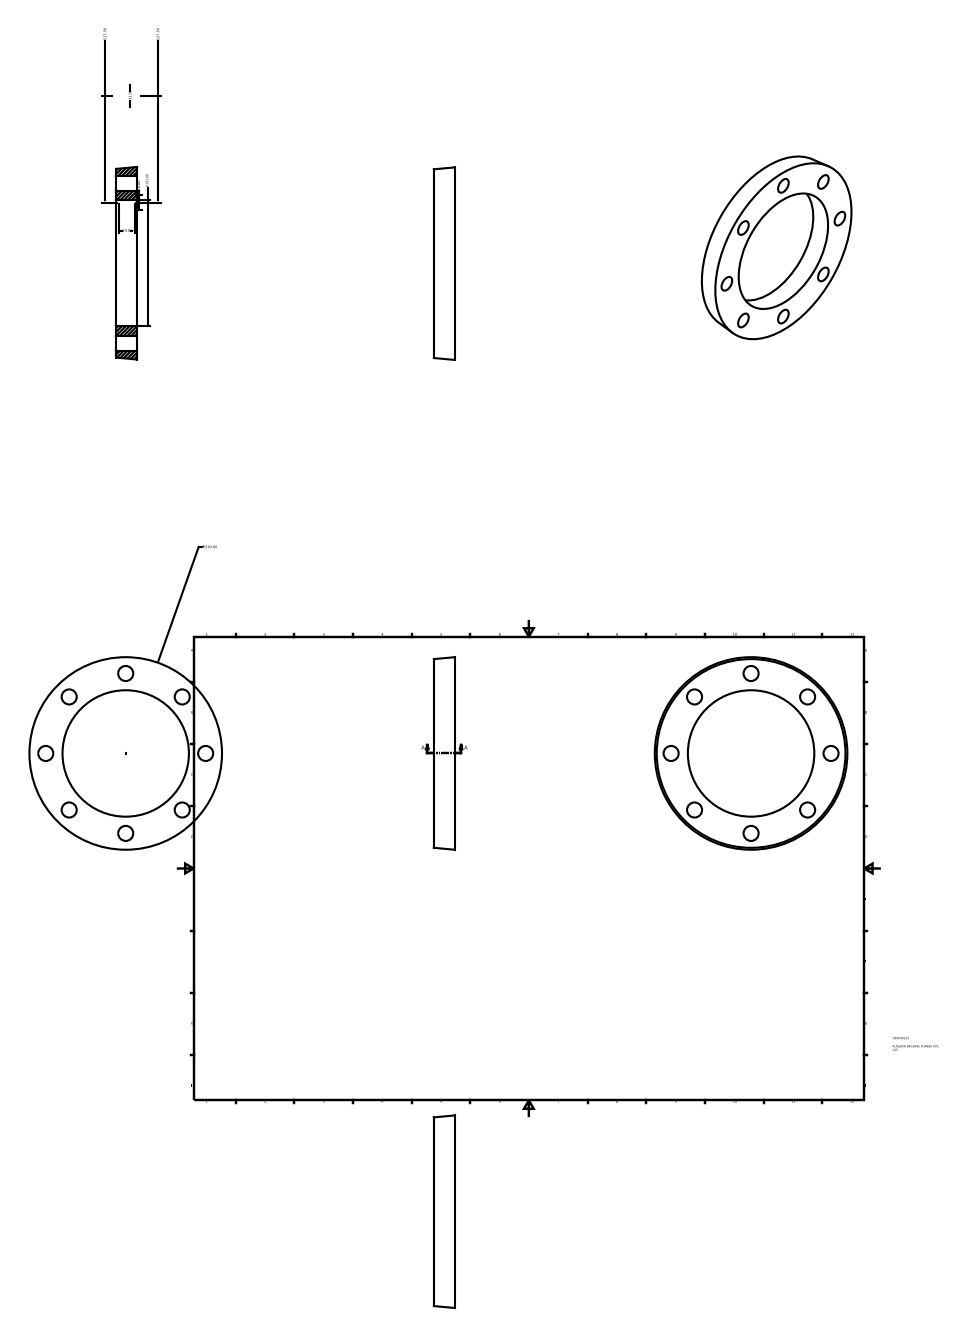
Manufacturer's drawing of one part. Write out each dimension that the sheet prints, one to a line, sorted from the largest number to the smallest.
∅230.00
n151.00
127.50
127.50
31.00
19.00
18.00
